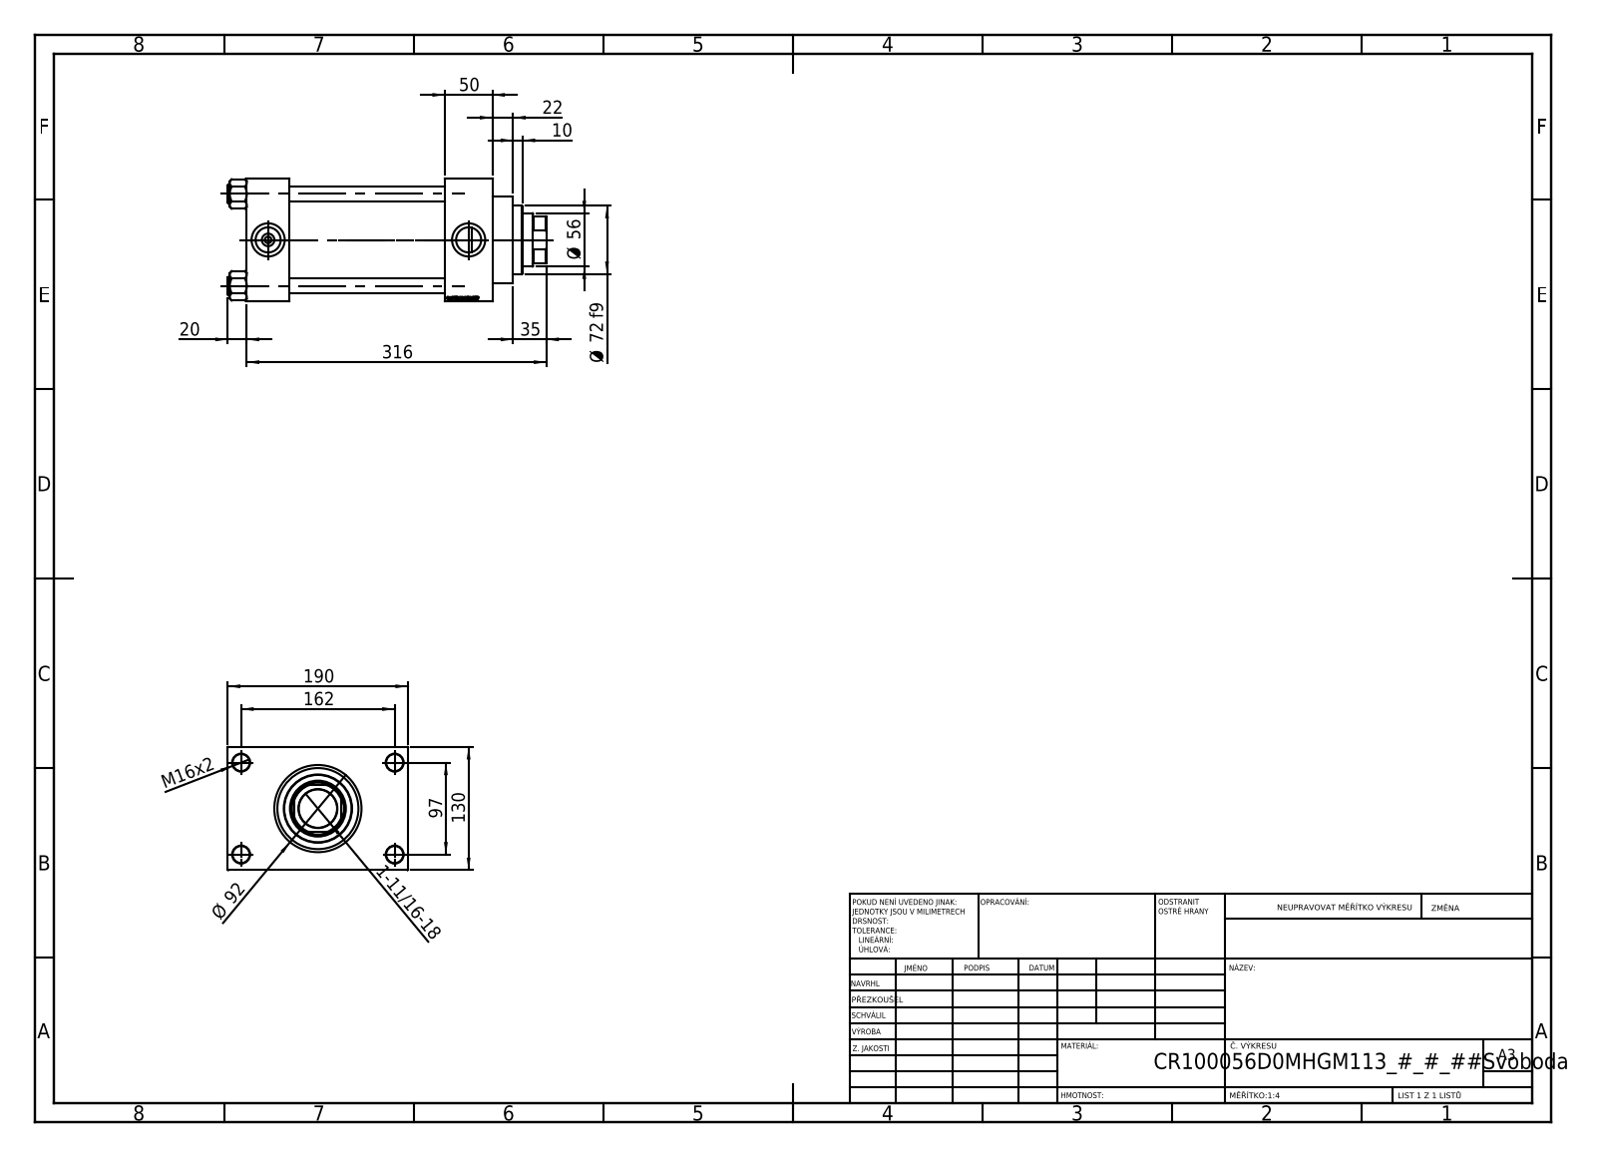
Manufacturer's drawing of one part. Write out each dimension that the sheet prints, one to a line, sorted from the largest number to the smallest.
316
190
162
130
97
Ø 92
Ø 72 f9
Ø 56
50
35
22
20
M16x2
10
1-11/16-18
